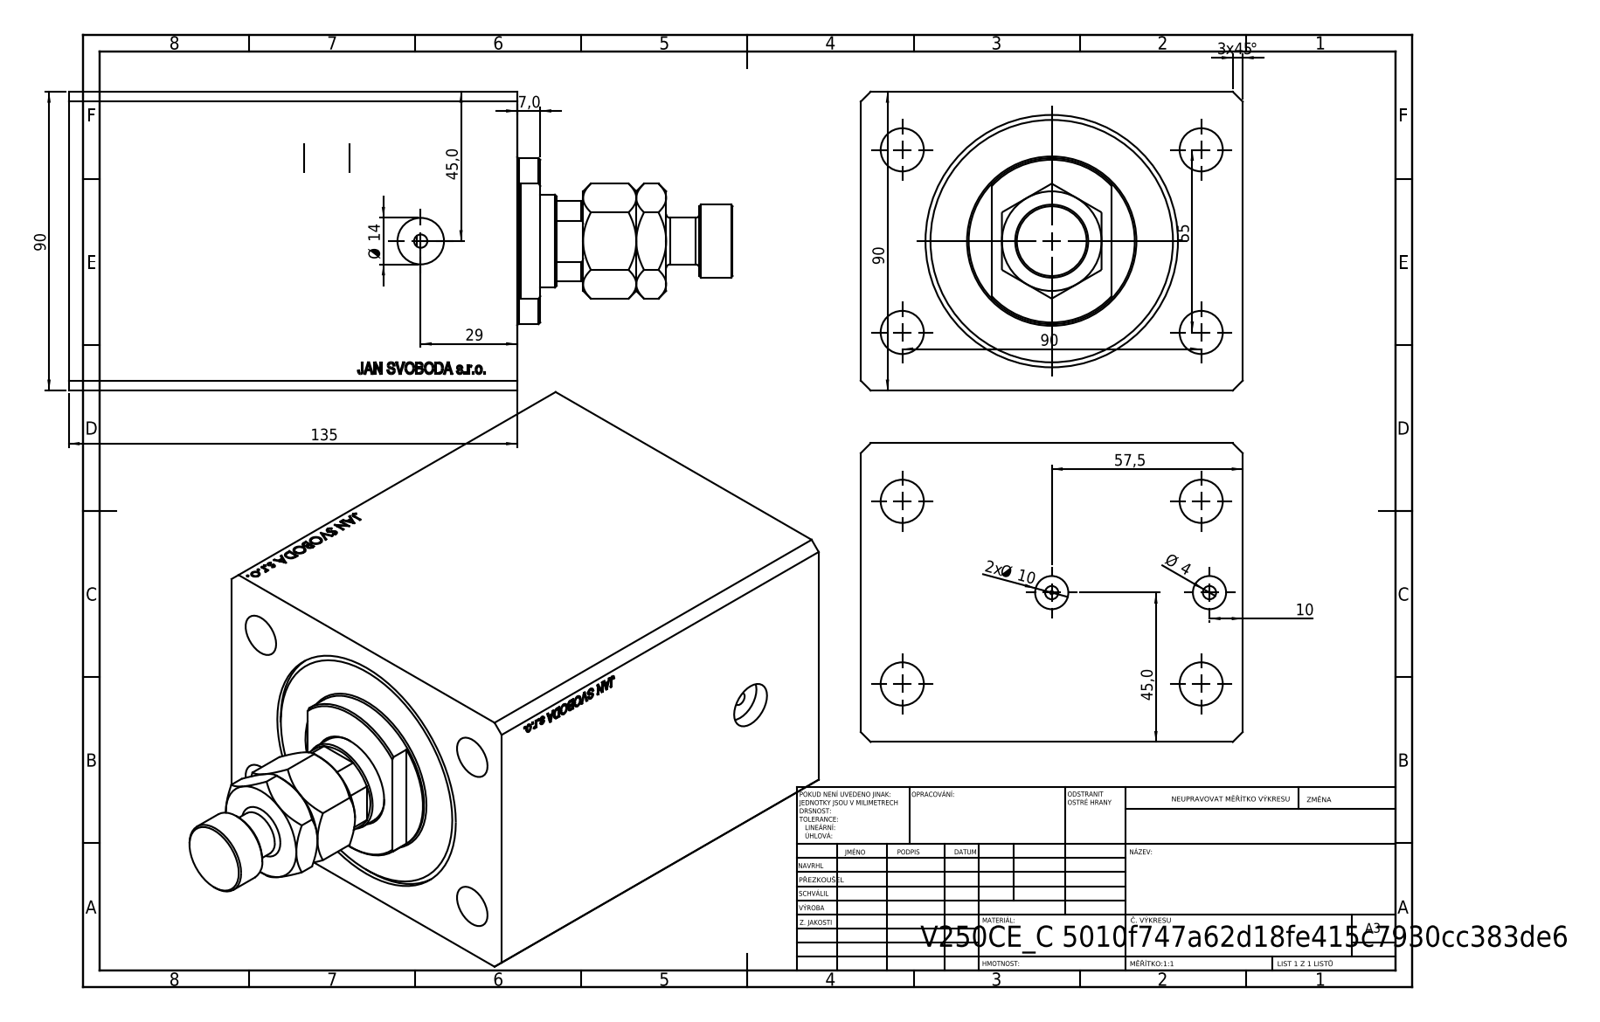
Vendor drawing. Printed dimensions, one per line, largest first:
135
90
90
90
57,5
55
3 x45 °
45,0
45,0
29
Ø 14
2x Ø 10
10
7,0
Ø 4
